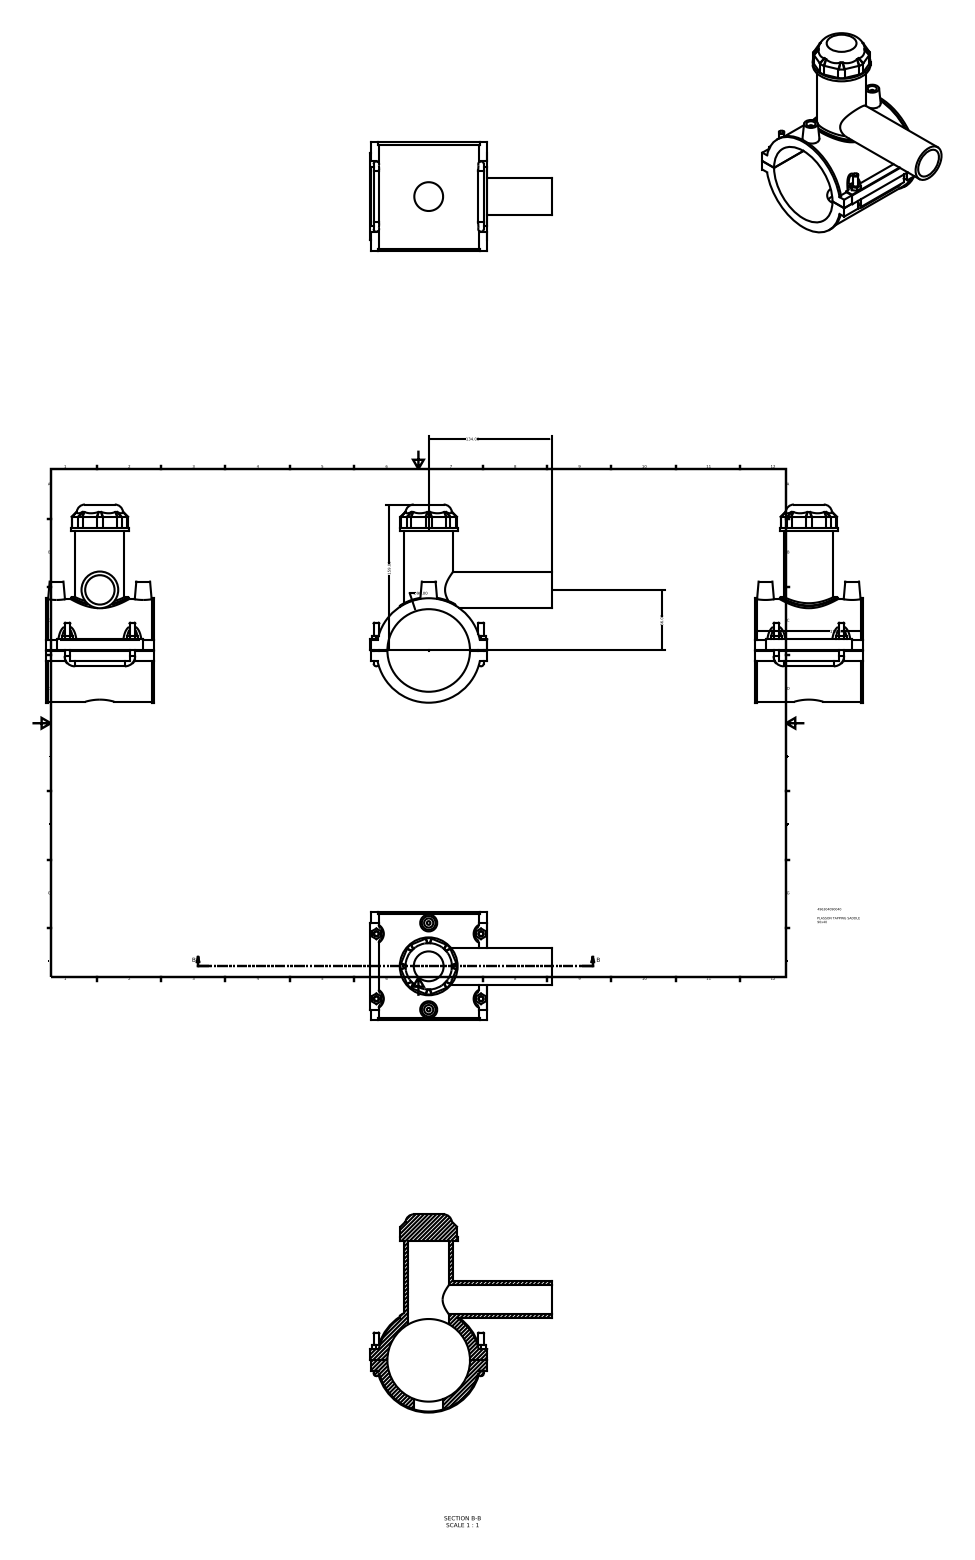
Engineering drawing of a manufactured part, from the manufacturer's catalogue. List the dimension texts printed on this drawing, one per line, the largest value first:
159.00
134.00
118.00
∅90.00
66.00
